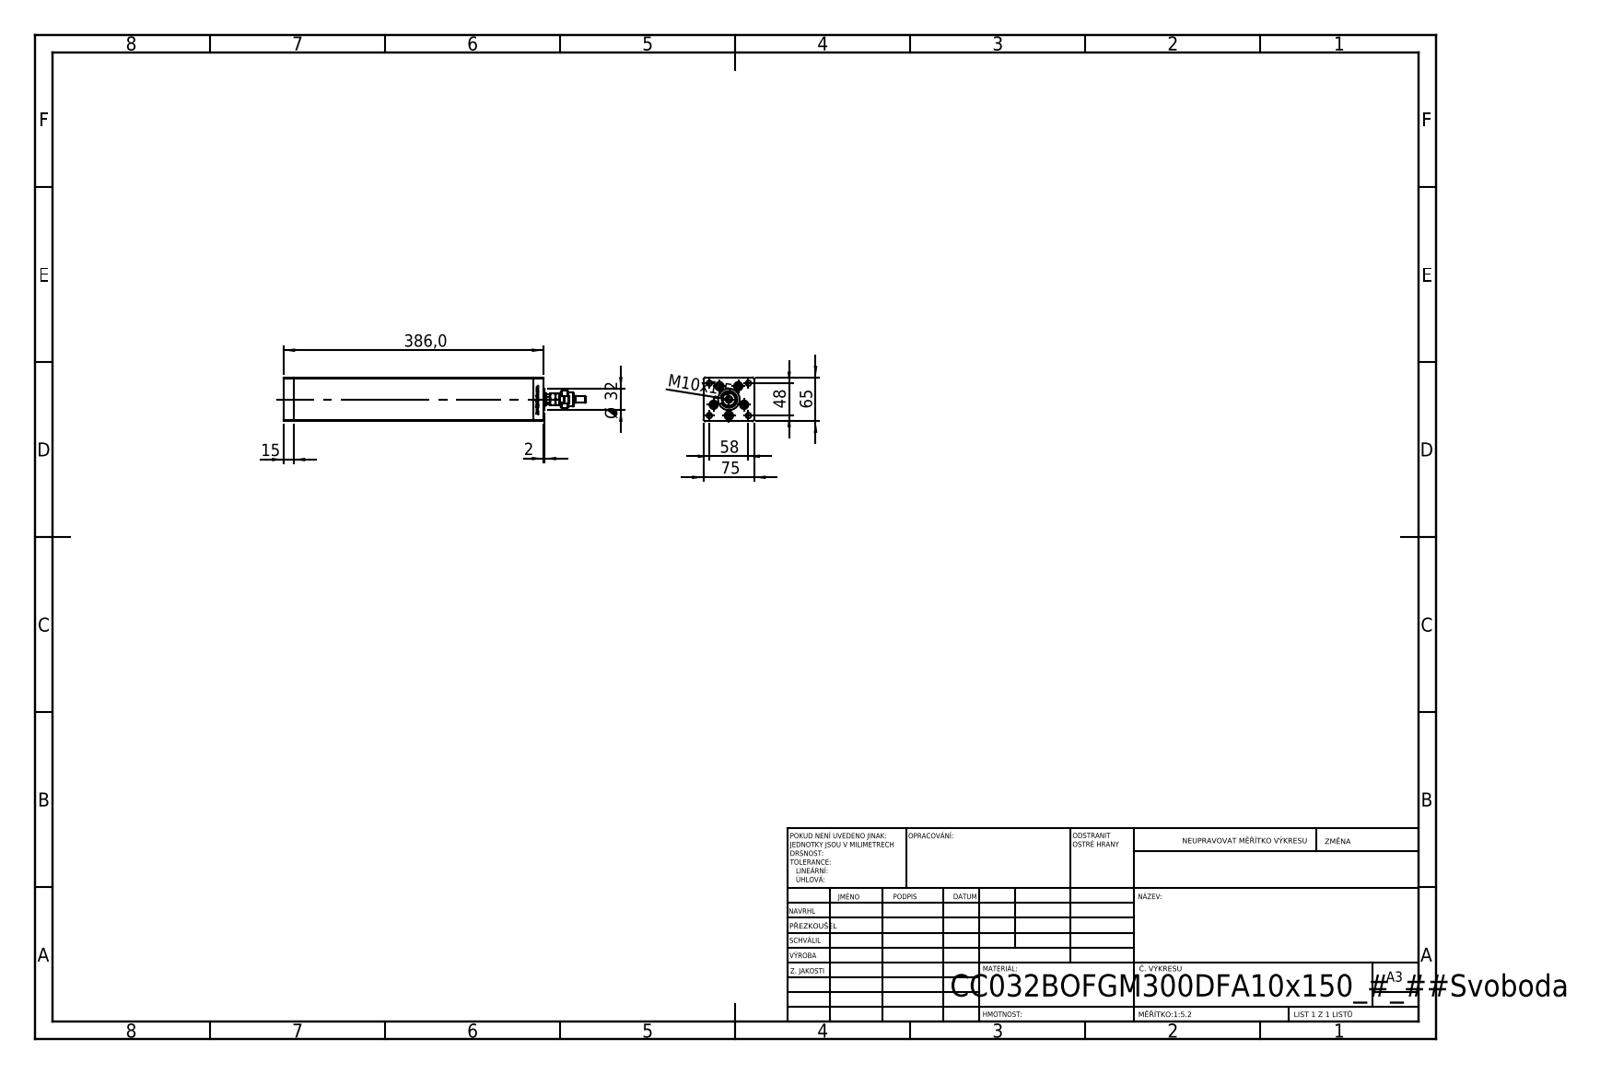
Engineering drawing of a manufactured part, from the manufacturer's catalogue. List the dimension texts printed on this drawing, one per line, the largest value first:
386,0
75
65
58
48
Ø 32
15
M10x1.5
2
